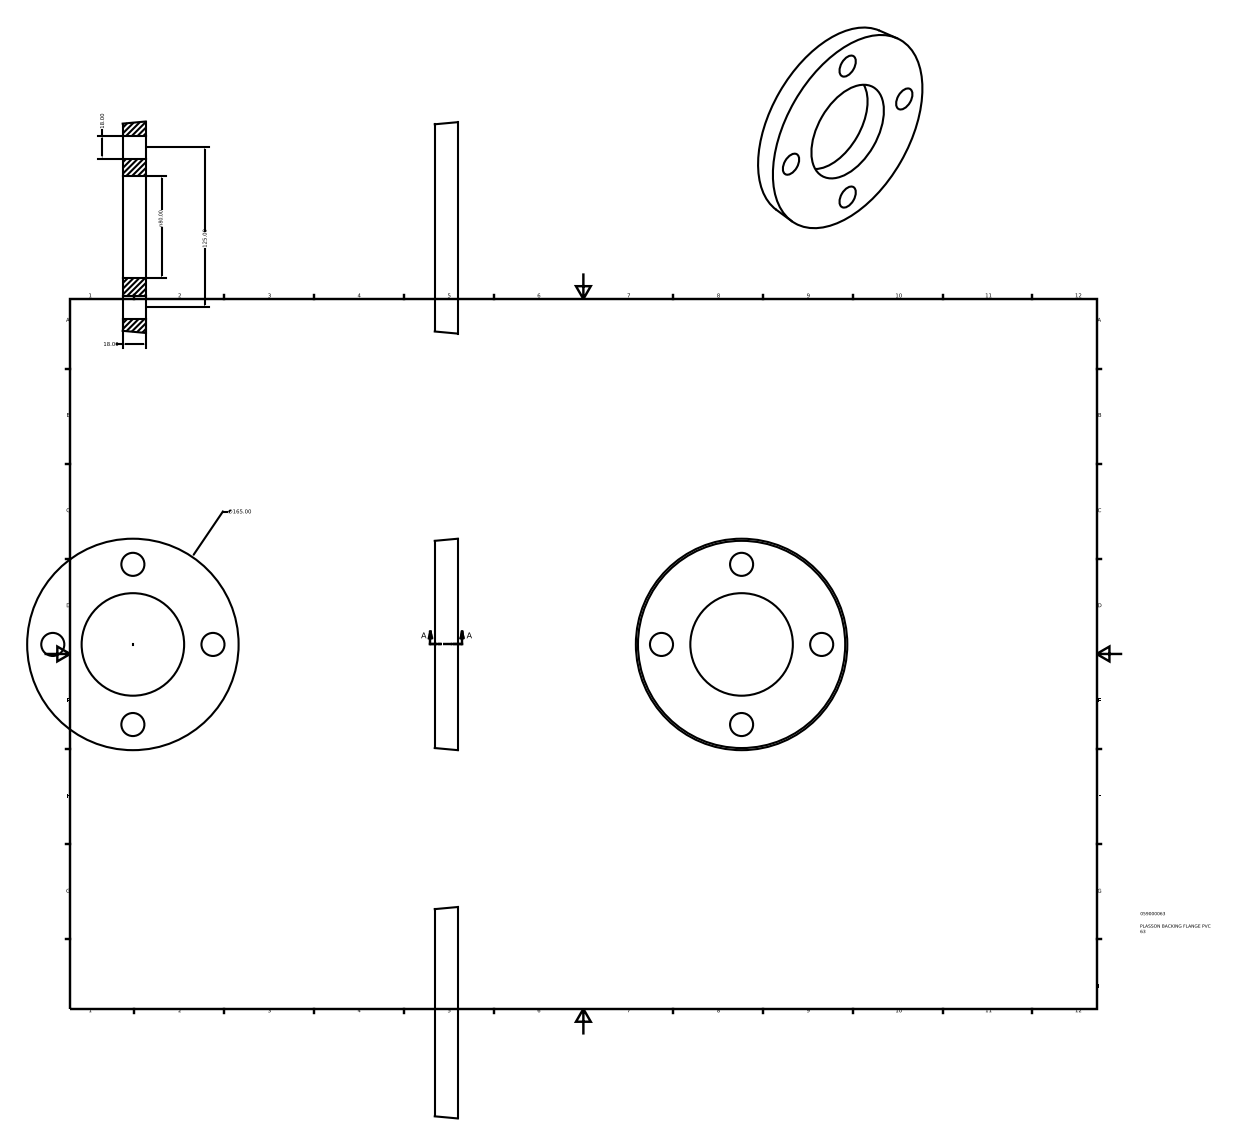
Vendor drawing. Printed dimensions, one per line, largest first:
∅165.00
125.00
n80.00
18.00
18.00
